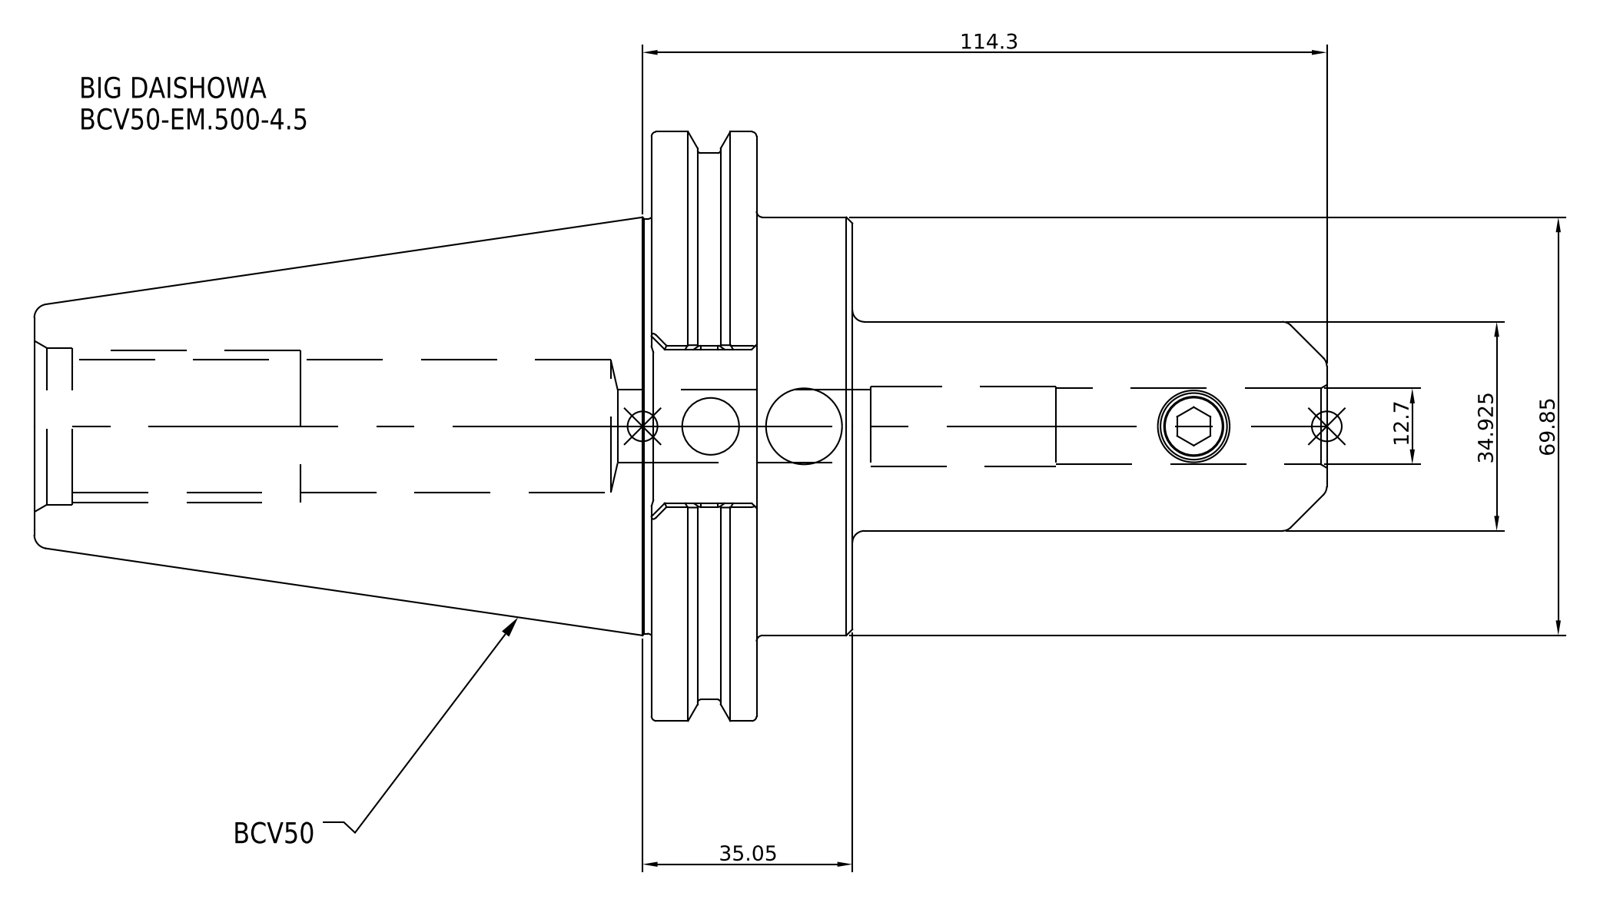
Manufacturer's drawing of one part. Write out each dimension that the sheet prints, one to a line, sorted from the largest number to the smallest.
114.3
69.85
35.05
34.925
12.7
